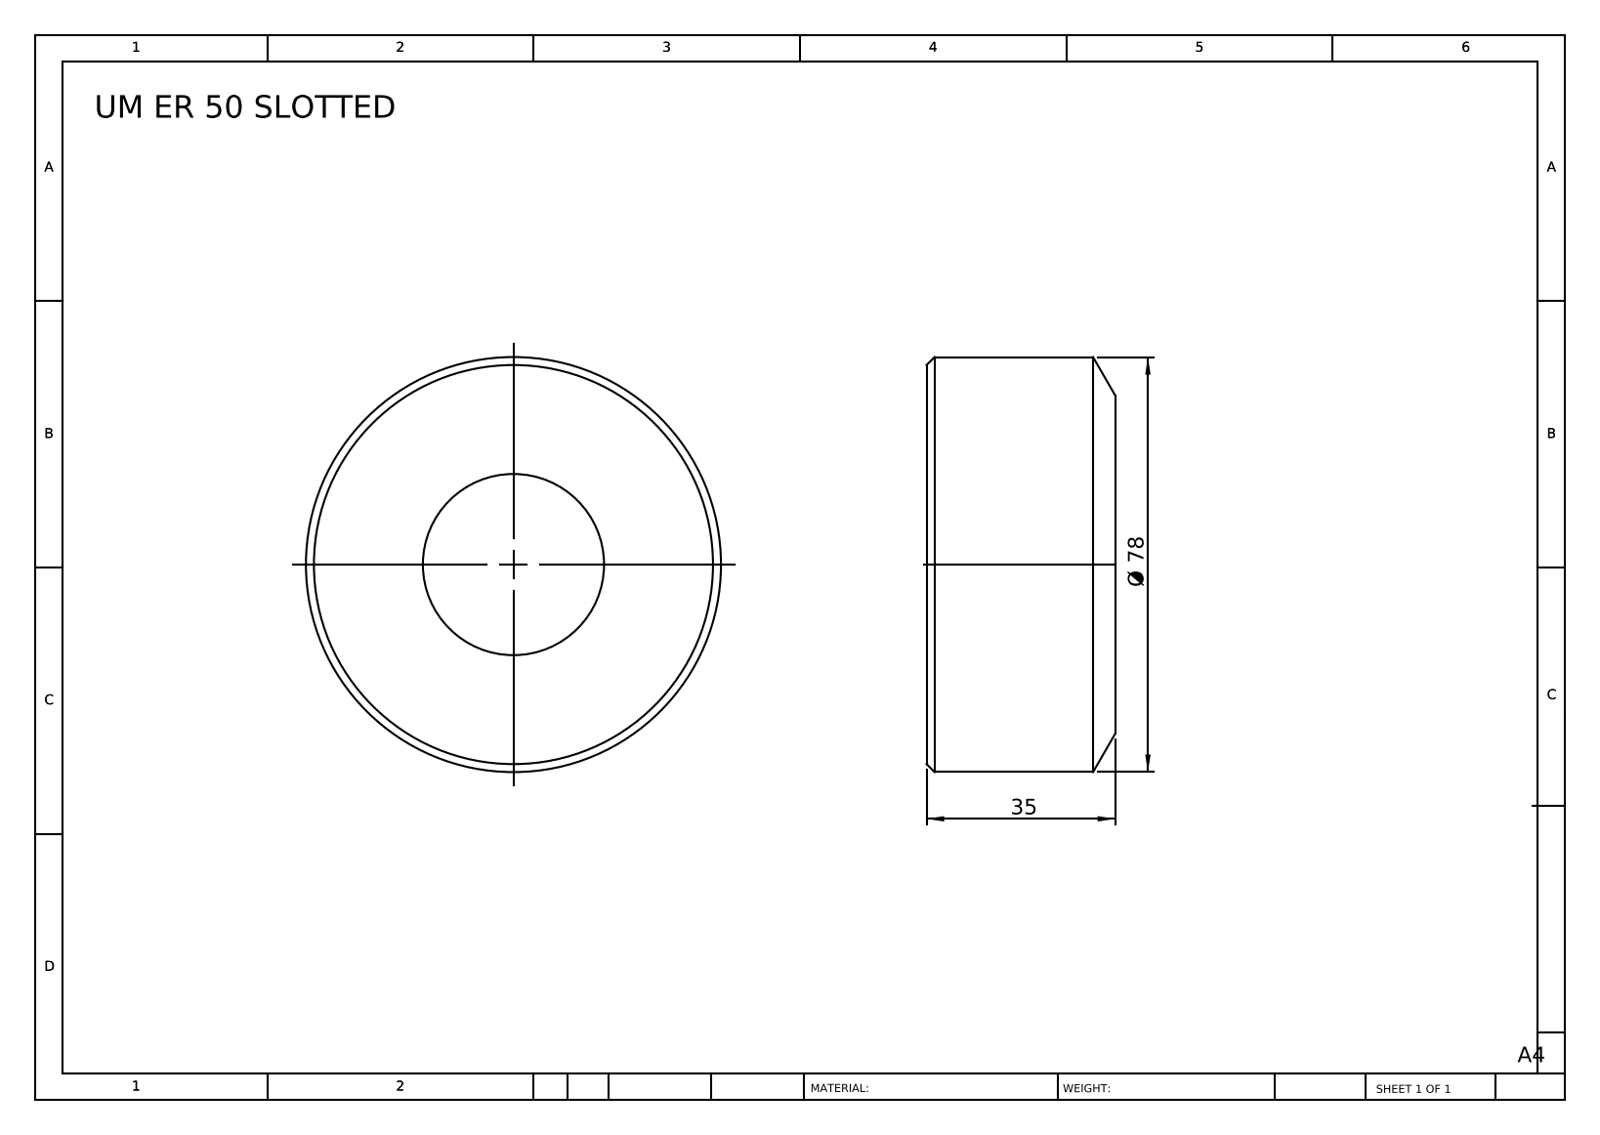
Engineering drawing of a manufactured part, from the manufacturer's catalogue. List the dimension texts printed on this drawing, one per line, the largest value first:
Ø 78
35
